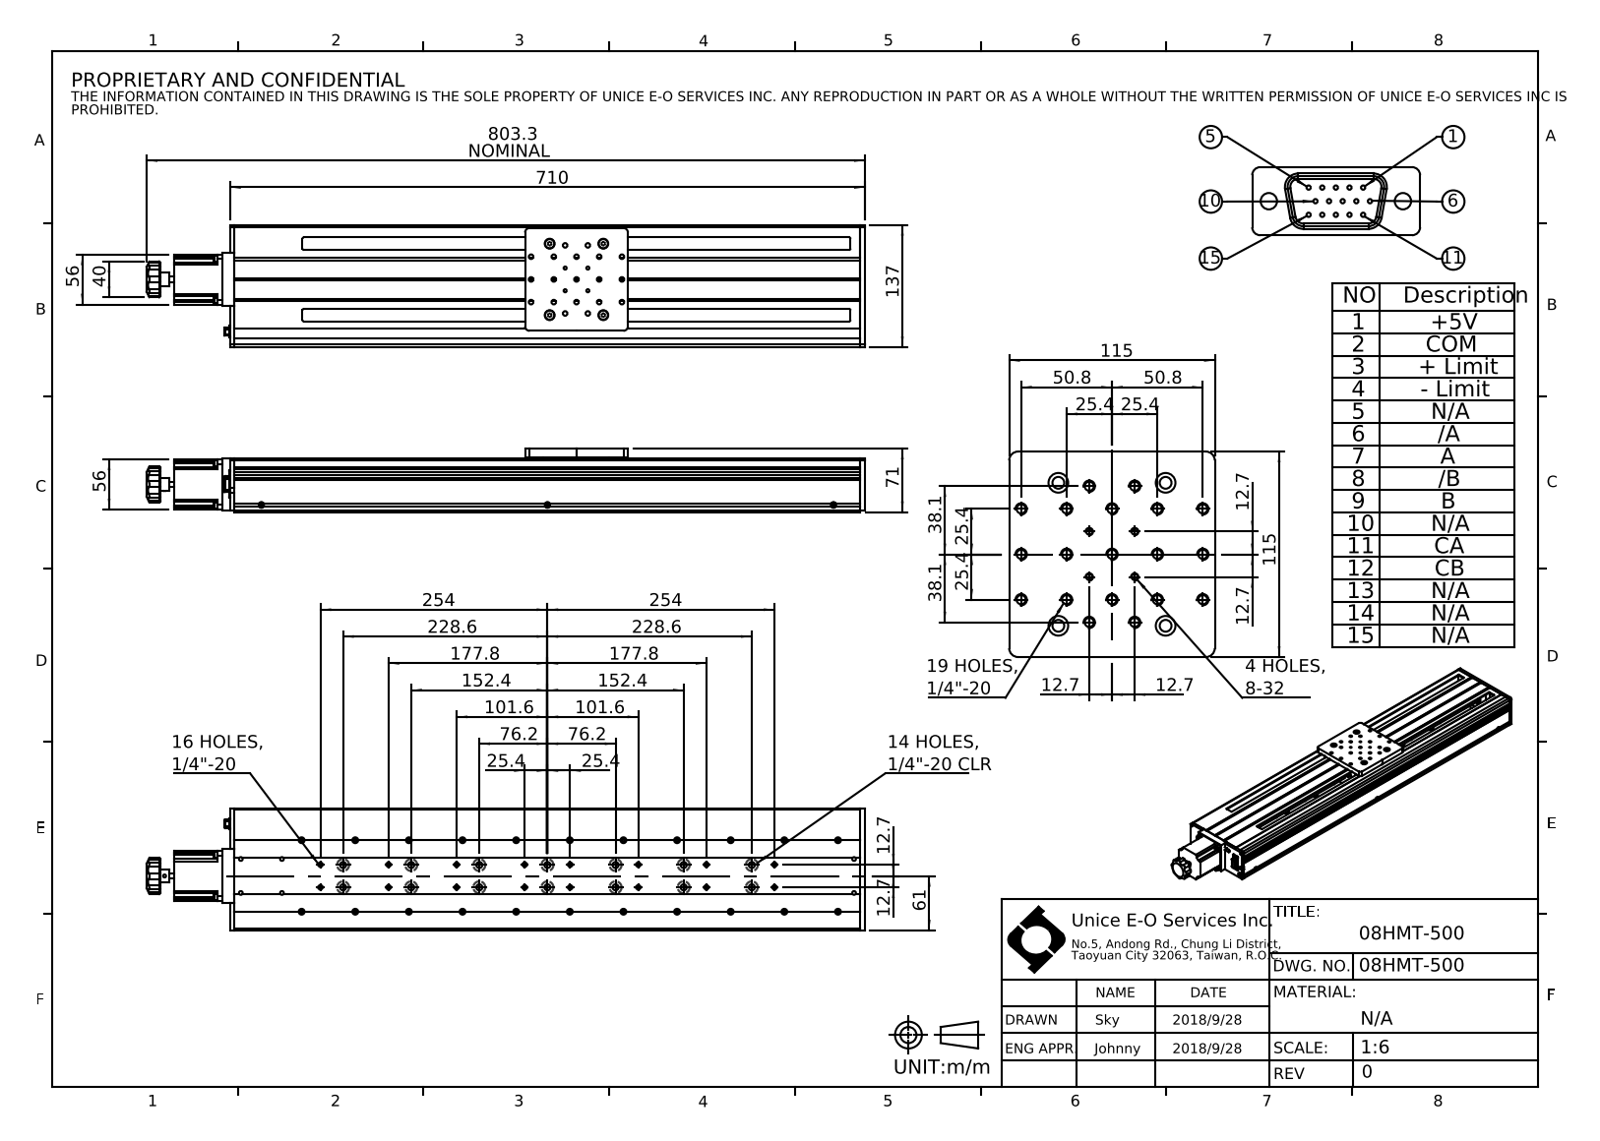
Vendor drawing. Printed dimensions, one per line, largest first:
803.3 NOMINAL
710
254
254
228.6
228.6
177.8
177.8
152.4
152.4
137
115
115
101.6
101.6
76.2
76.2
71
61
56
56
50.8
50.8
40
38.1
38.1
25.4
25.4
25.4
25.4
25.4
25.4
12.7
12.7
12.7
12.7
12.7
12.7
